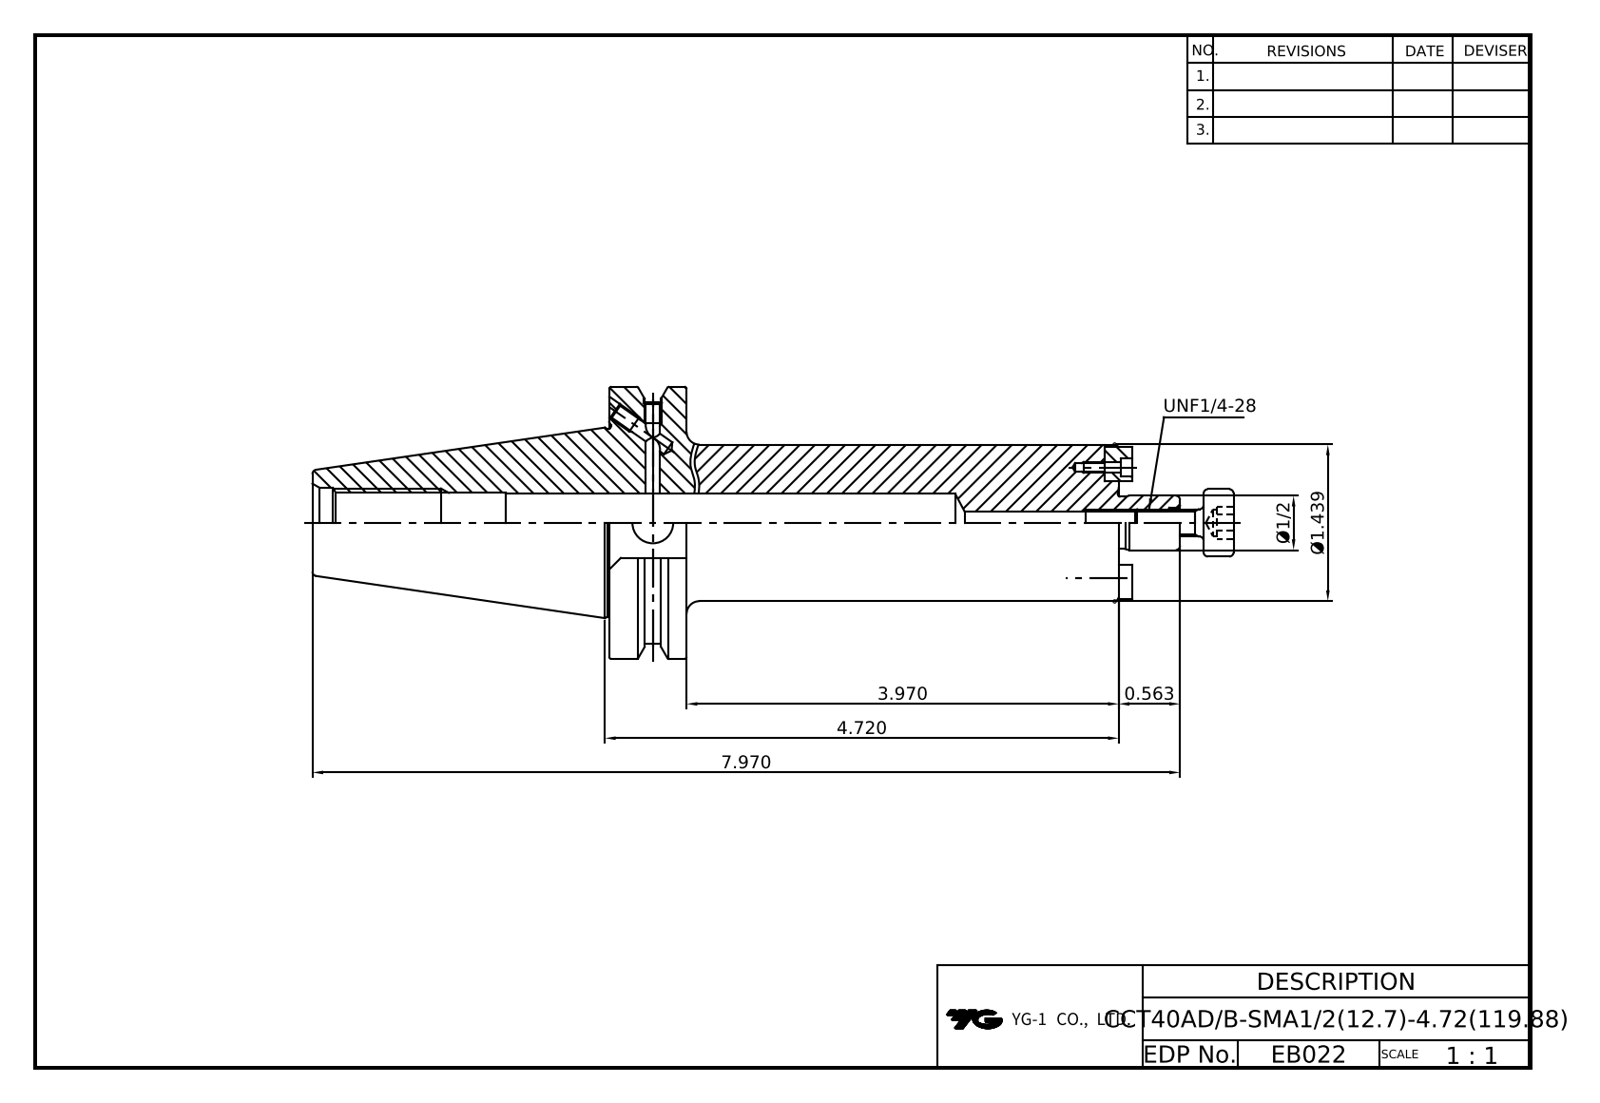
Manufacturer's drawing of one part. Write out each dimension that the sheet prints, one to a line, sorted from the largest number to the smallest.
7.970
4.720
3.970
Ø1.439
0.563
Ø1/2
